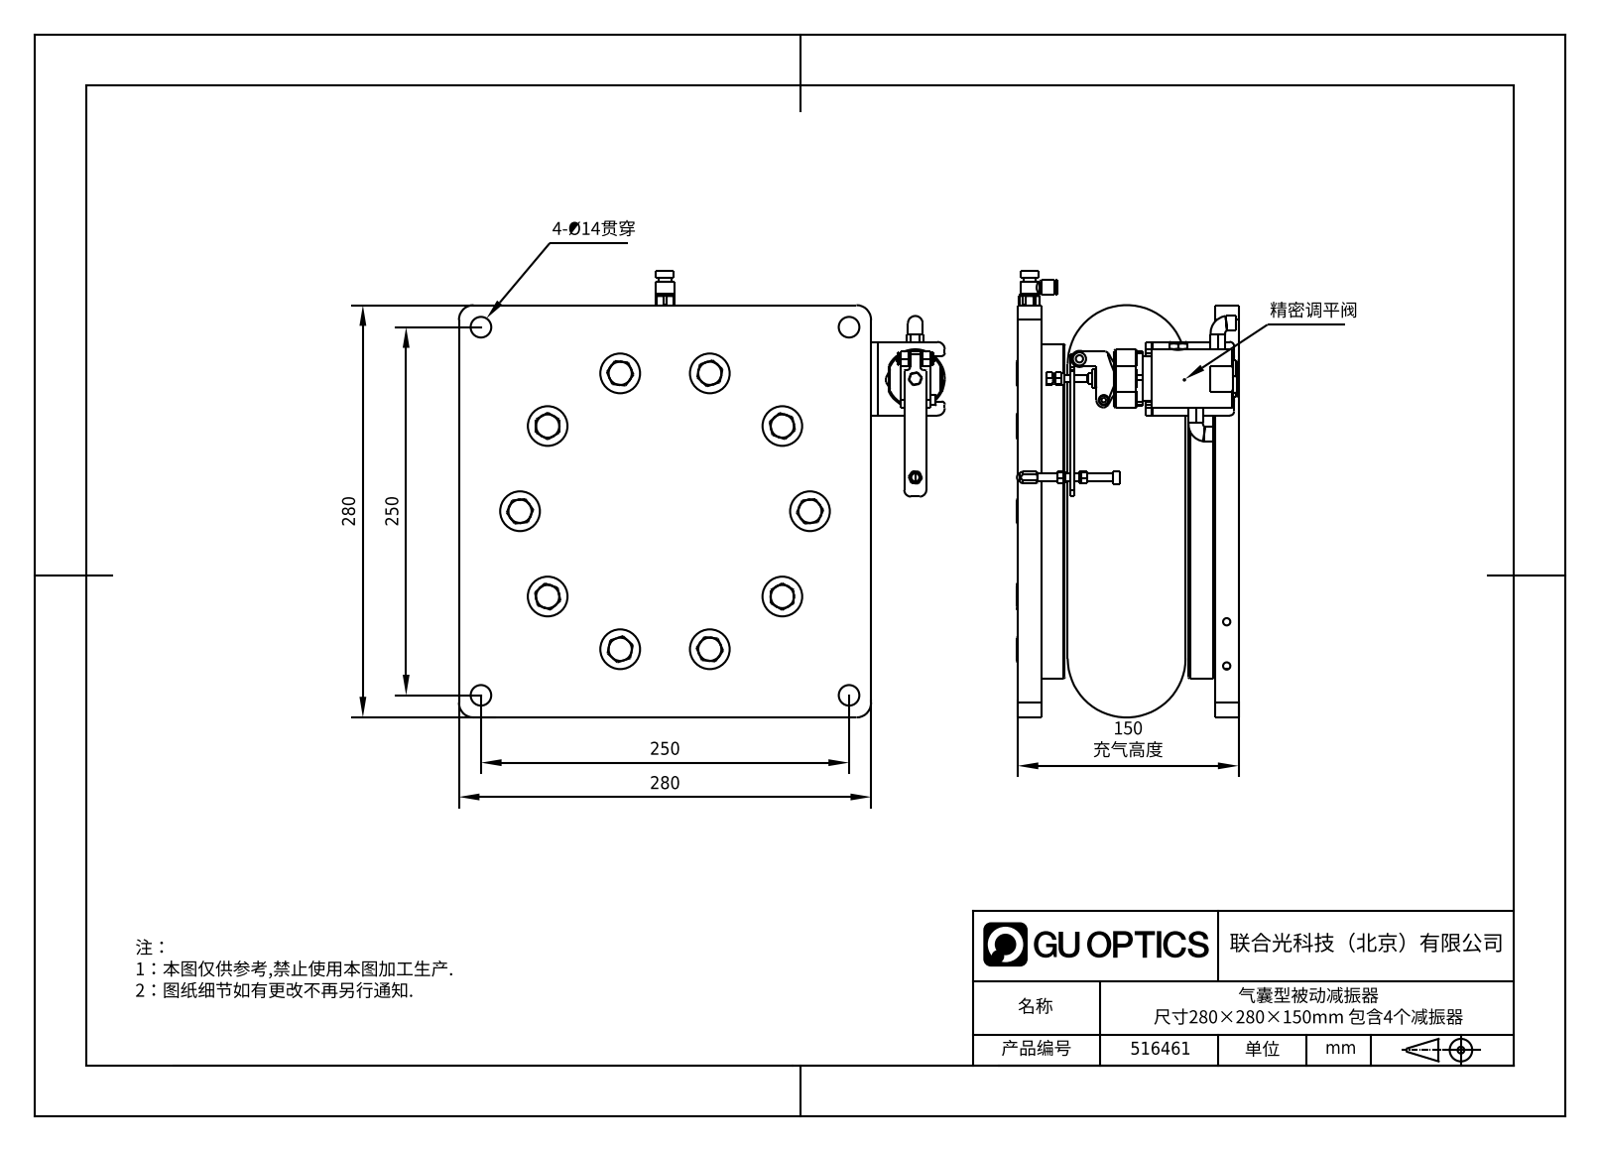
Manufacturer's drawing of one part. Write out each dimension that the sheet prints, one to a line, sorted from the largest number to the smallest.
280
280
250
250
150 充气高度
